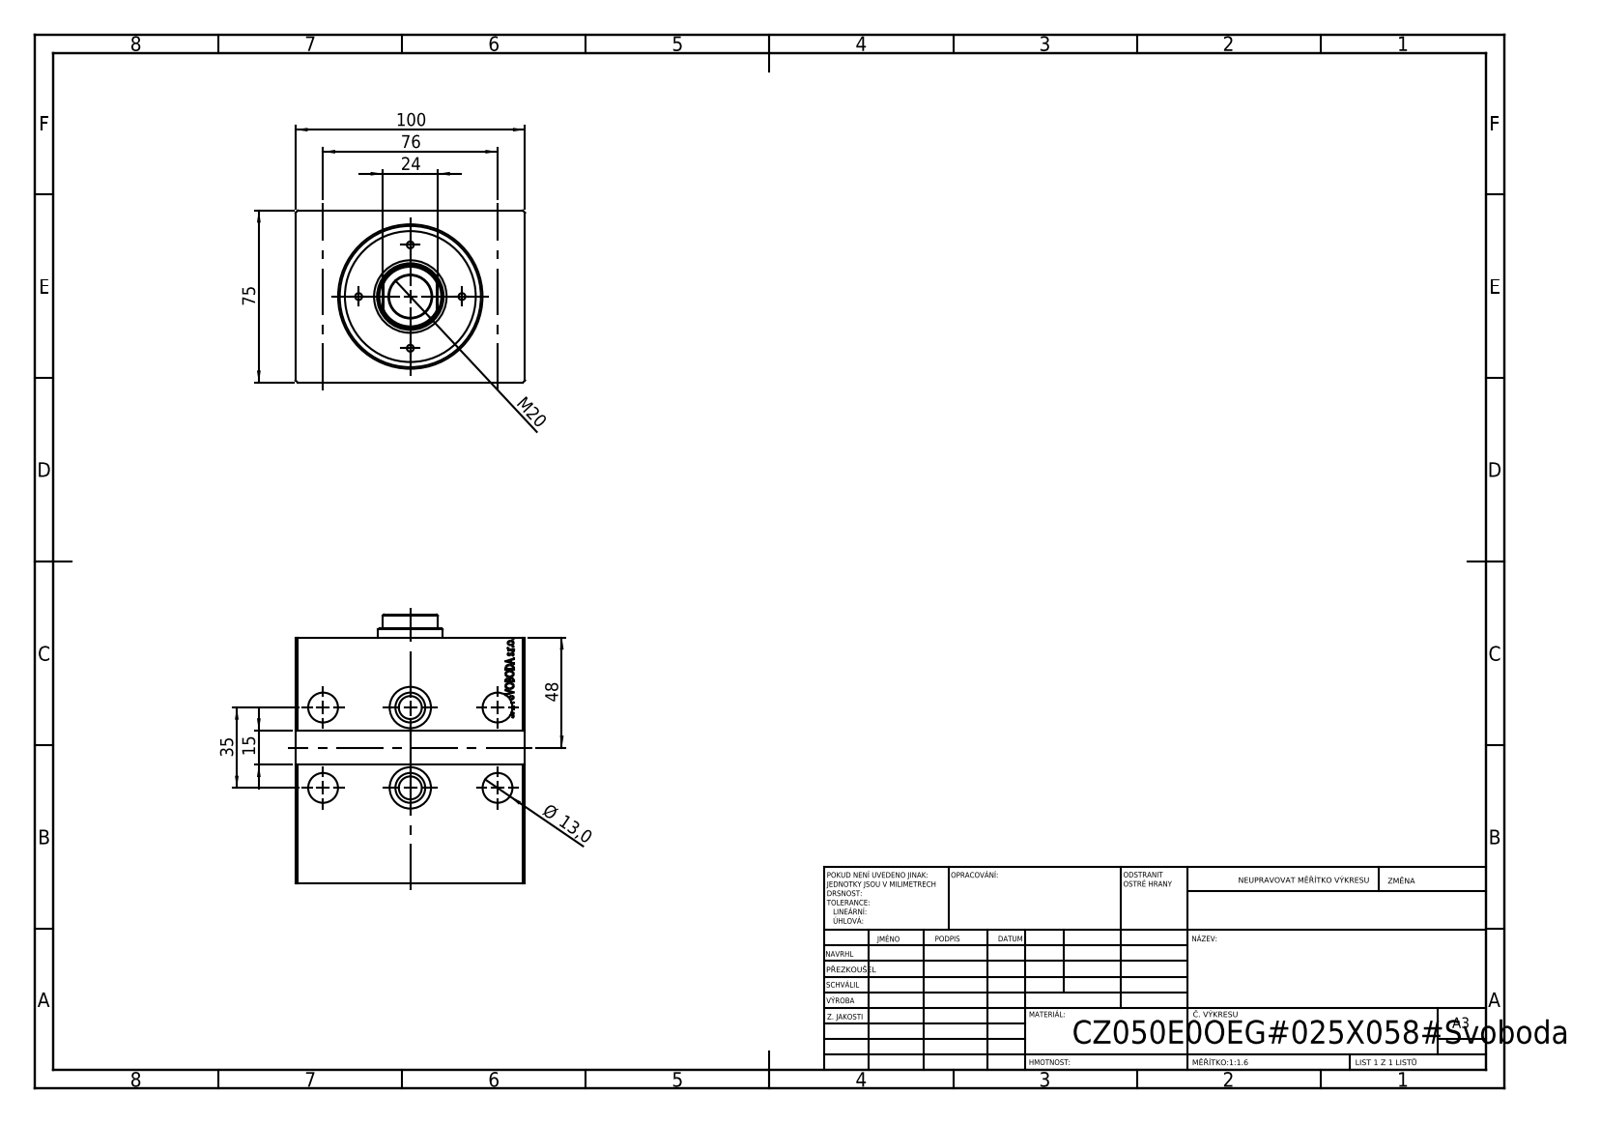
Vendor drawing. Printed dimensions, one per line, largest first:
100
76
75
48
35
24
M20
15
Ø 13,0
